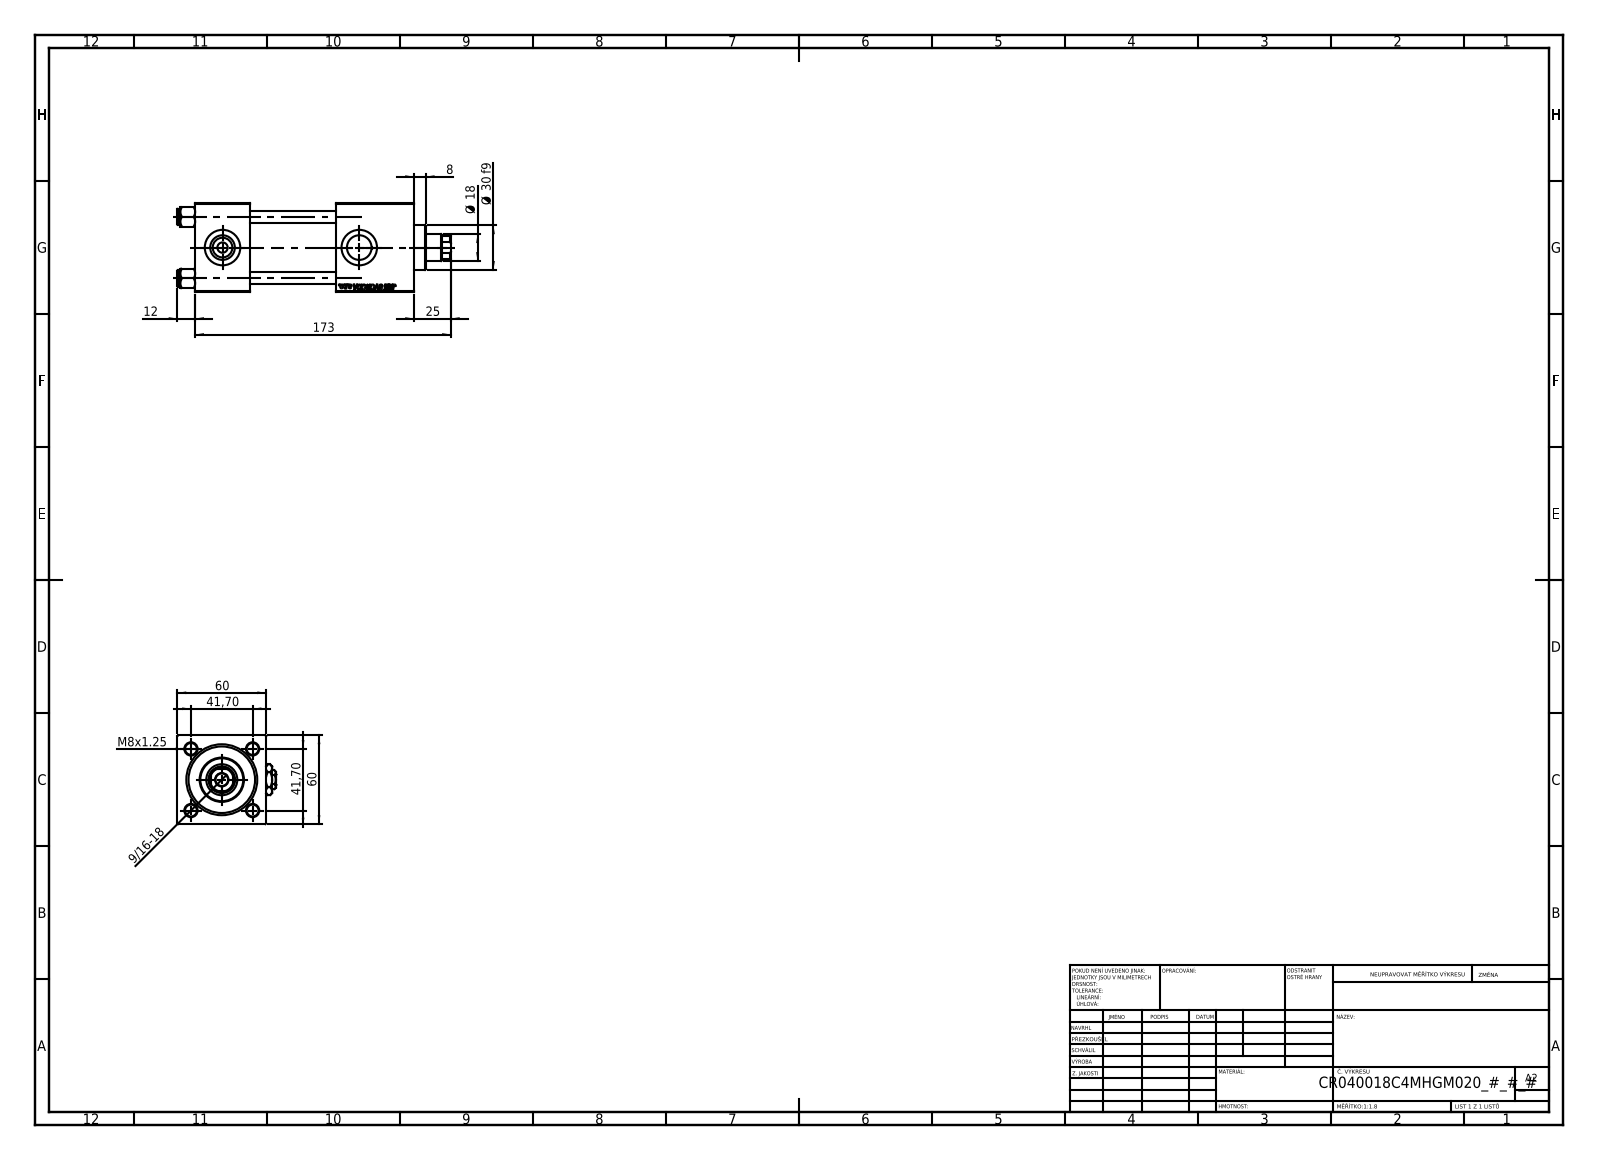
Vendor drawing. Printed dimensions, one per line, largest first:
173
60
60
41,70
41,70
Ø 30 f9
25
Ø 18
12
8
M8x1.25
9/16-18
